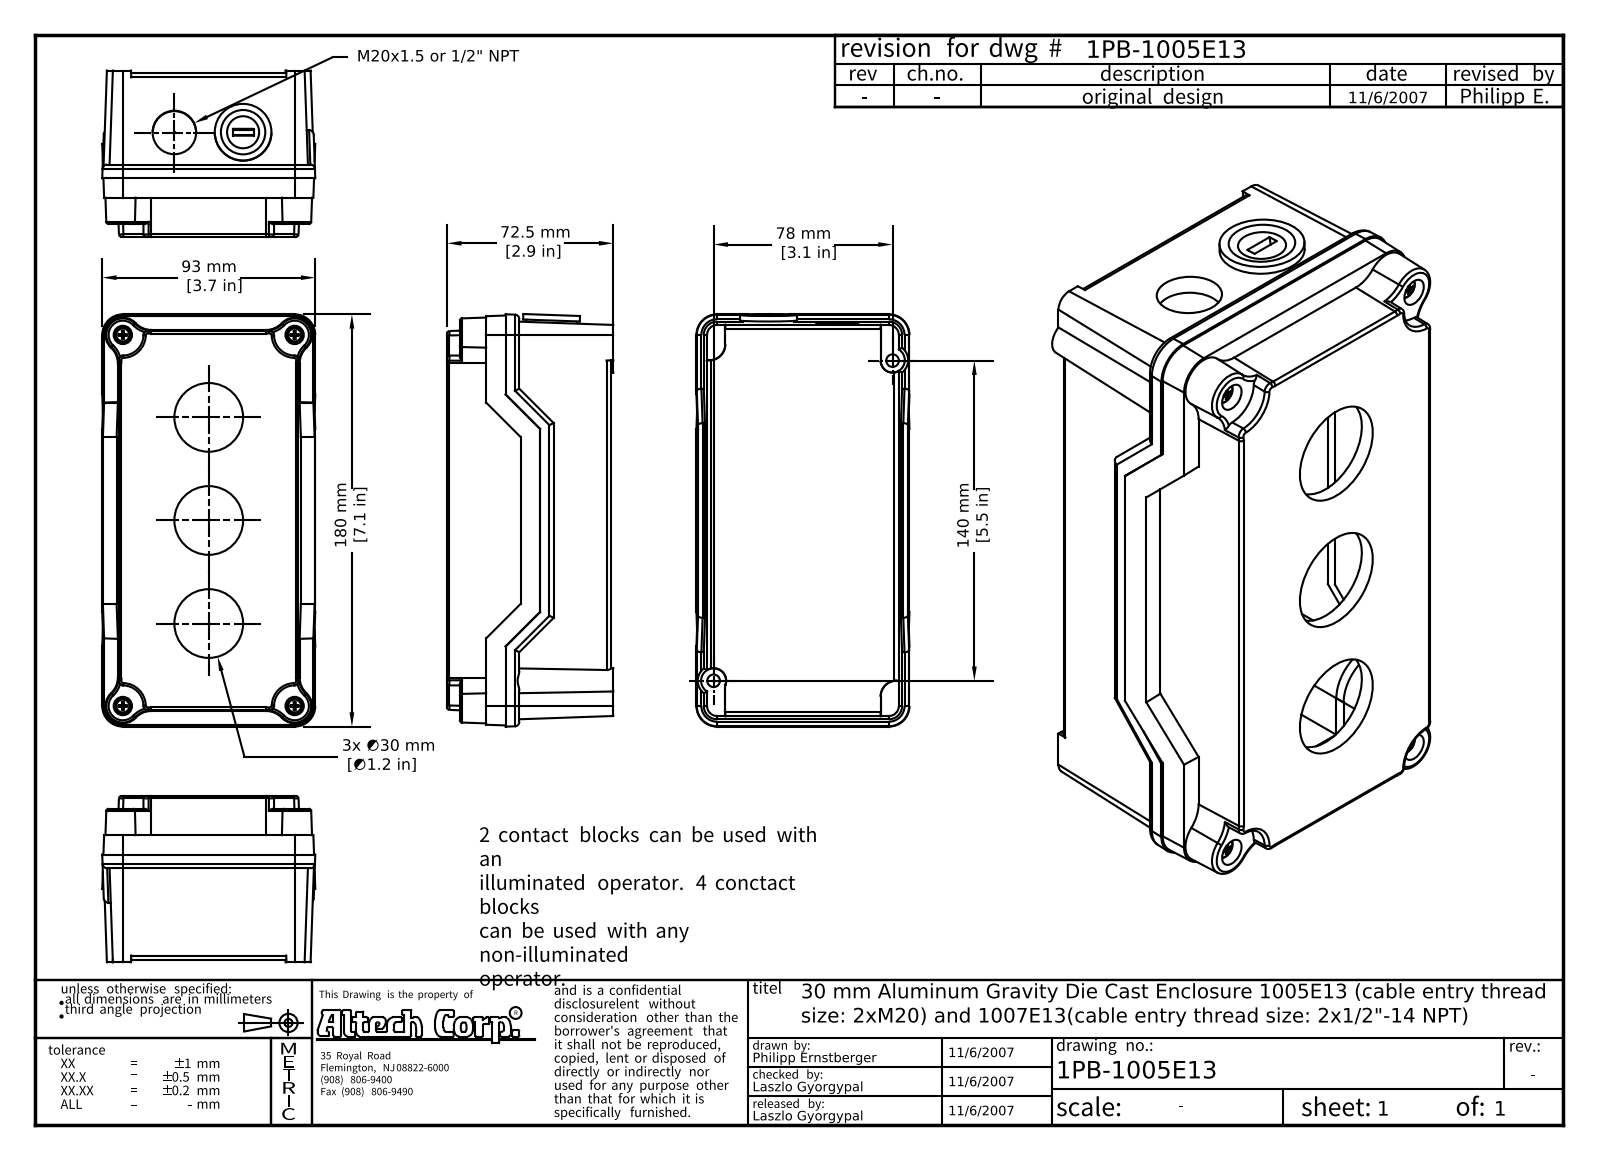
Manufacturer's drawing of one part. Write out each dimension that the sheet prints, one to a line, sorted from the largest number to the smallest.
180 mm [7.1 in]
140 mm [5.5 in]
93 mm [3.7 in]
78 mm [3.1 in]
72.5 mm [2.9 in]
3x ∅30 mm [∅1.2 in]
M20x1.5 or 1/2" NPT
